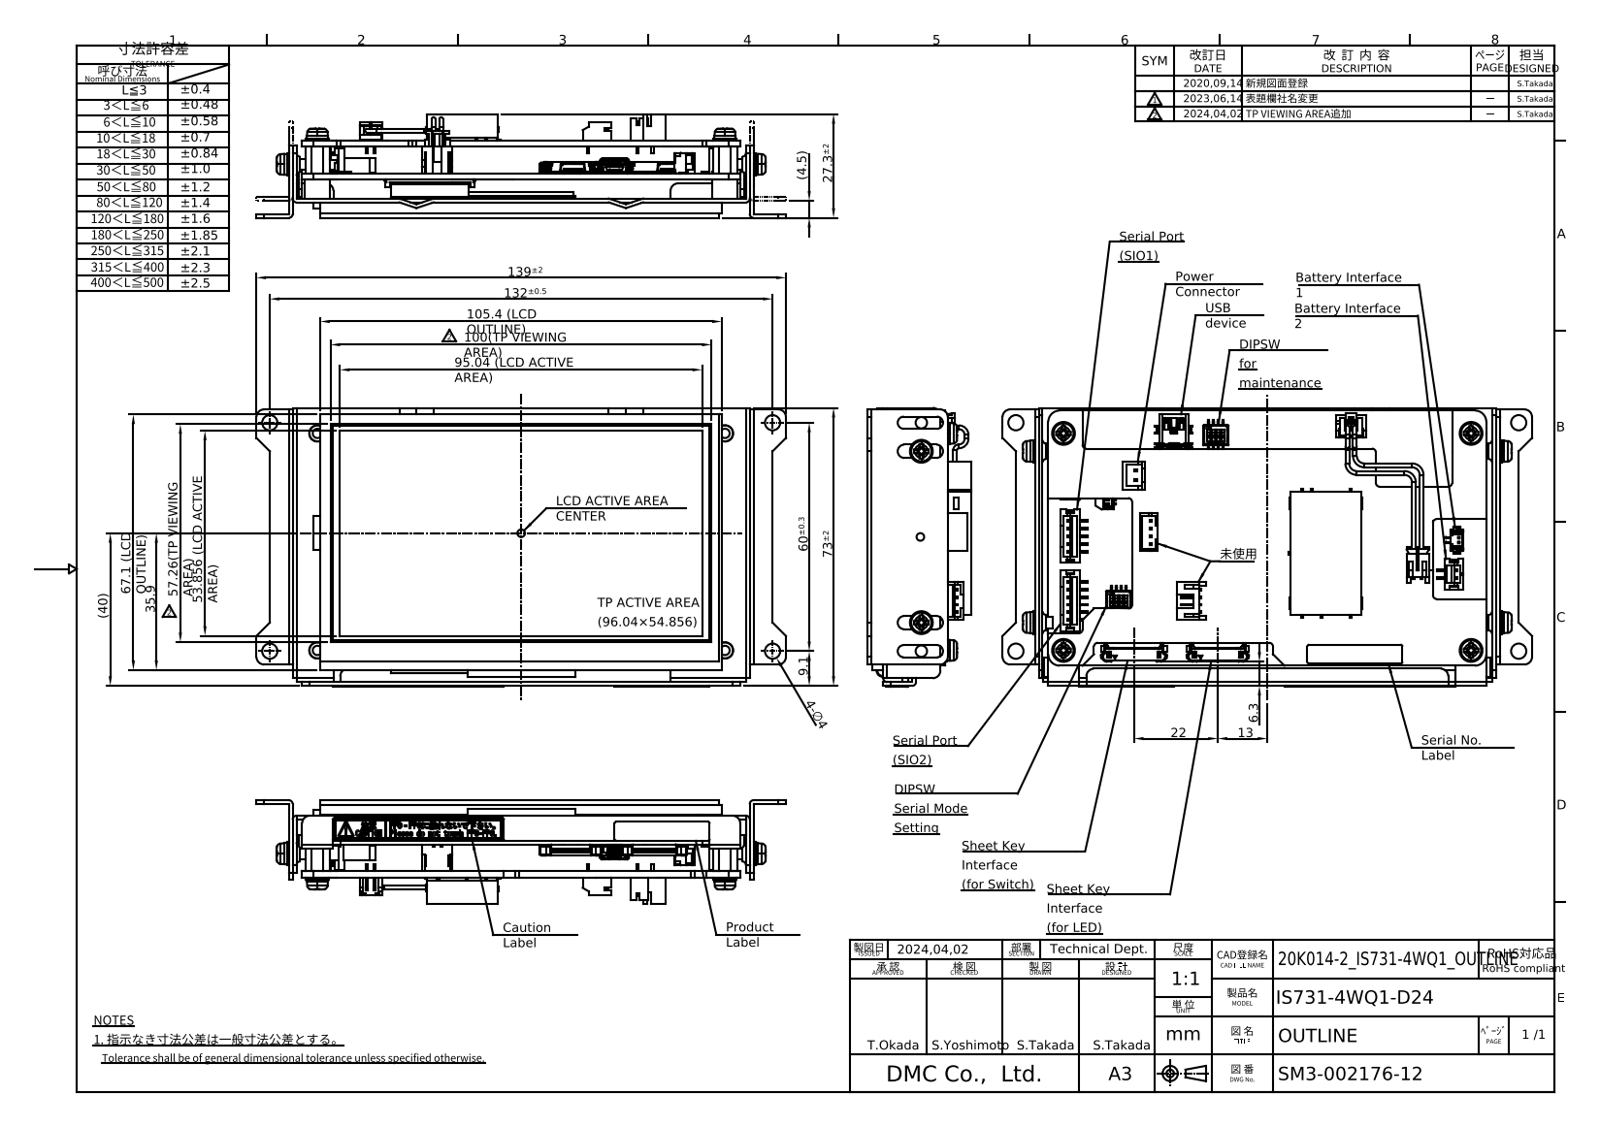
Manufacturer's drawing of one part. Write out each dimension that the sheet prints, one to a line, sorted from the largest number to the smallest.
139±2
132±0.5
105.4 (LCD OUTLINE)
100(TP VIEWING AREA)
95.04 (LCD ACTIVE AREA)
73±2
67.1 (LCD OUTLINE)
60±0.3
57.26(TP VIEWING AREA)
53.856 (LCD ACTIVE AREA)
(40)
35.9
27.3±2
22
13
9.1
6.3
(4.5)
4-∅4
